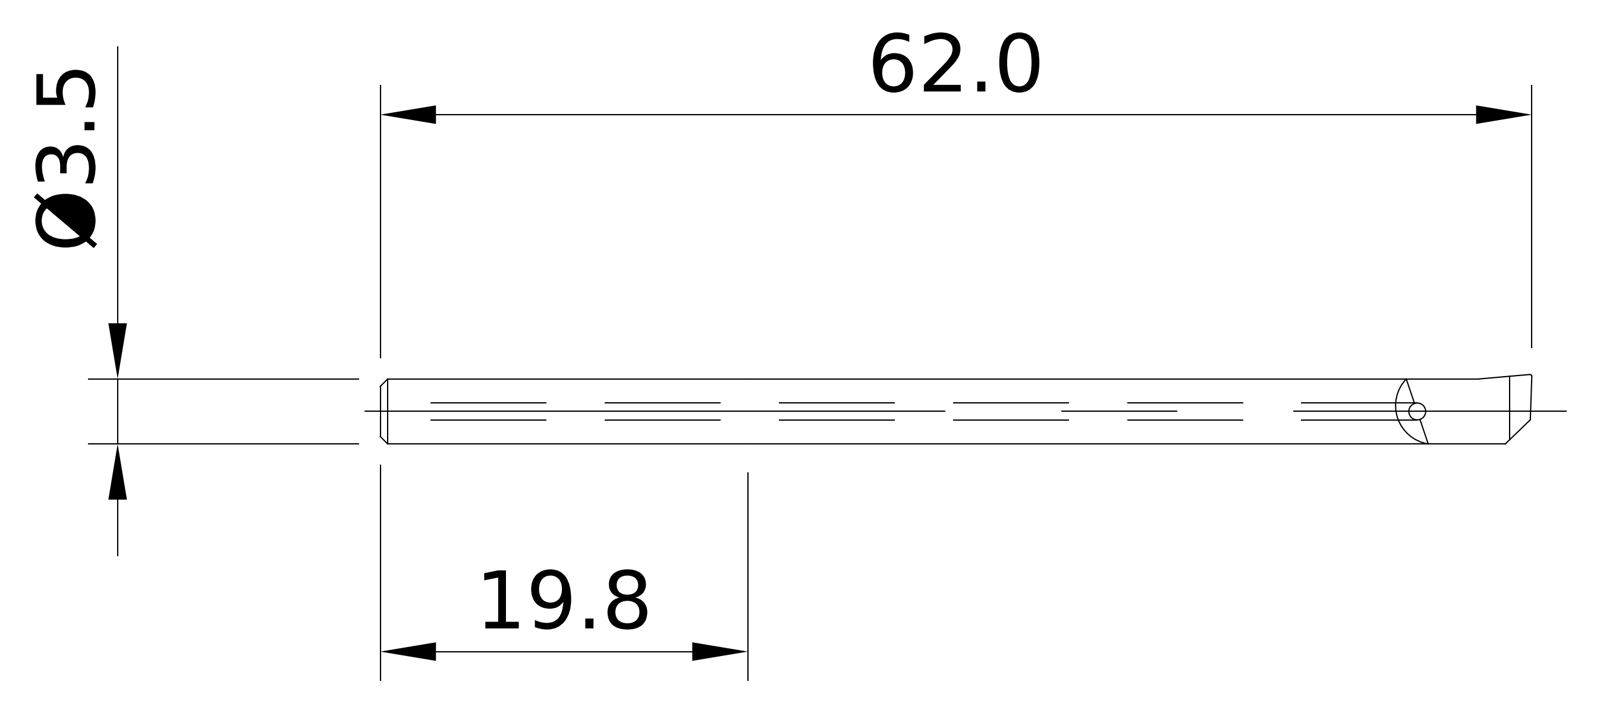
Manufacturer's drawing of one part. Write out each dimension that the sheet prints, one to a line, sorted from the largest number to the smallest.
62.0
19.8
Ø3.5
